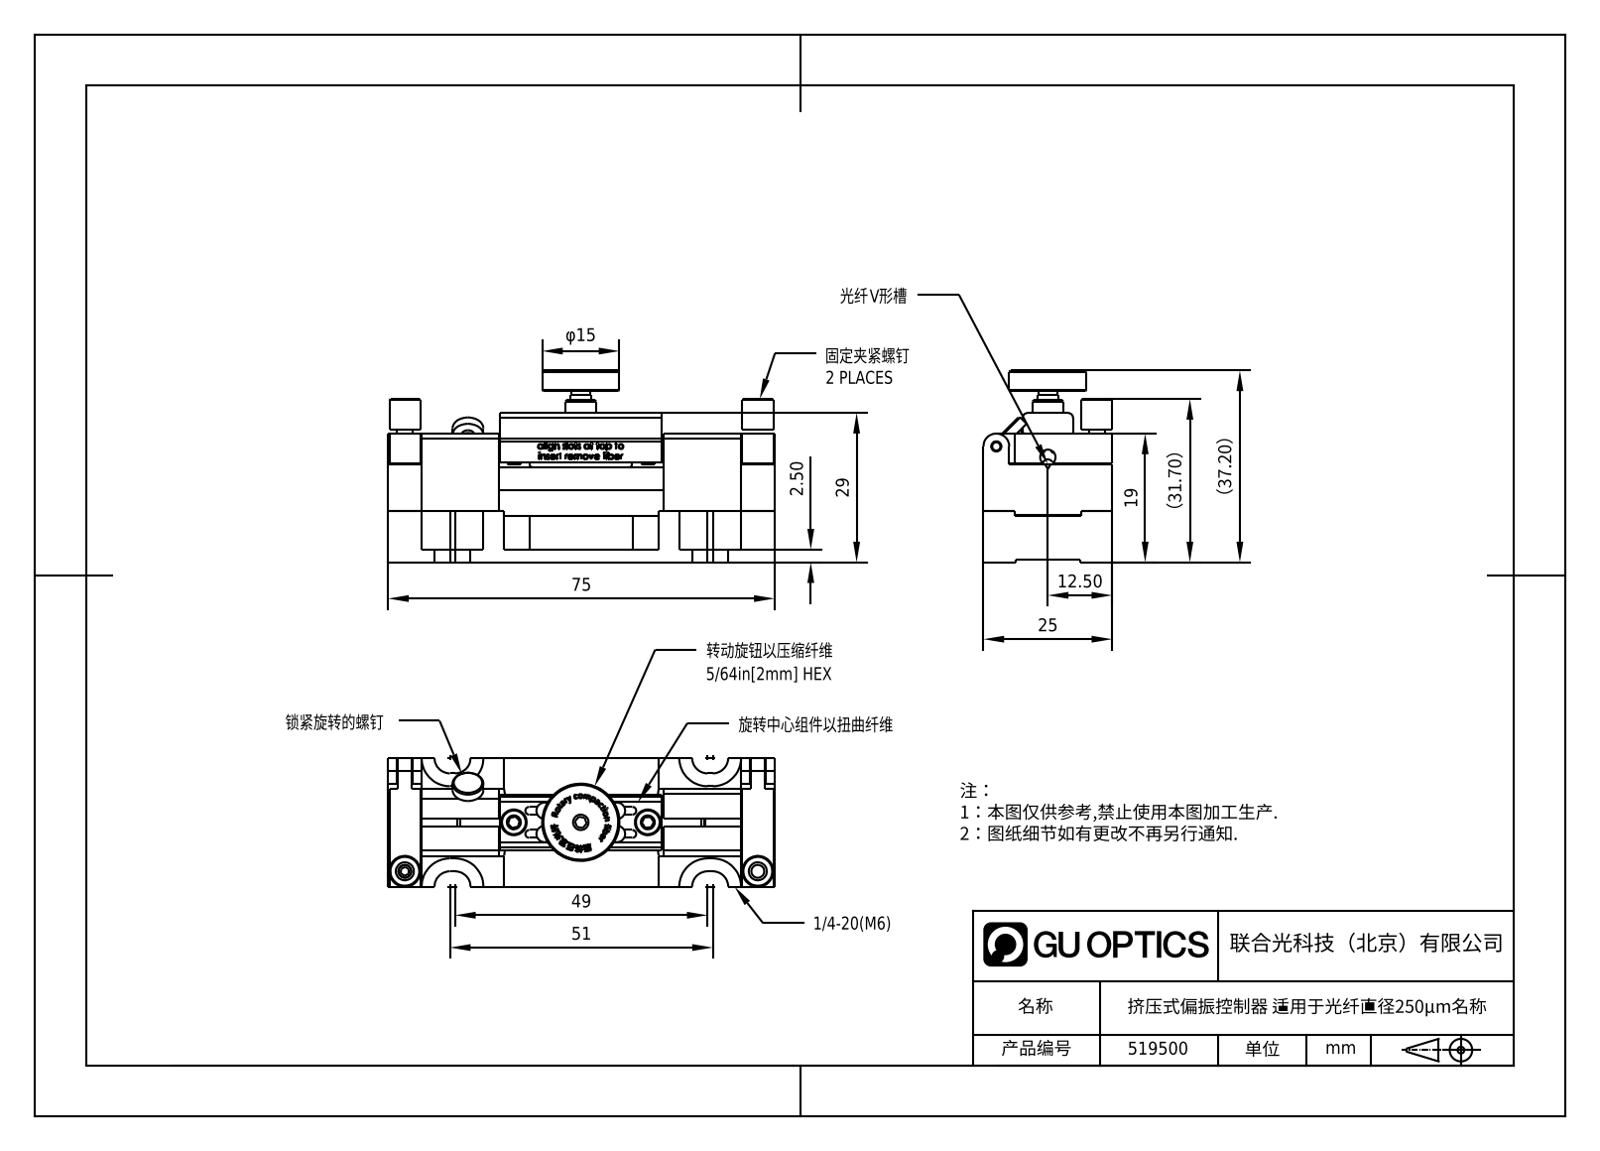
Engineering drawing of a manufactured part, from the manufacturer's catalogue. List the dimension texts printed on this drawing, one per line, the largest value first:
75
51
49
（37.20）
（31.70）
29
25
19
φ15
12.50
2.50
